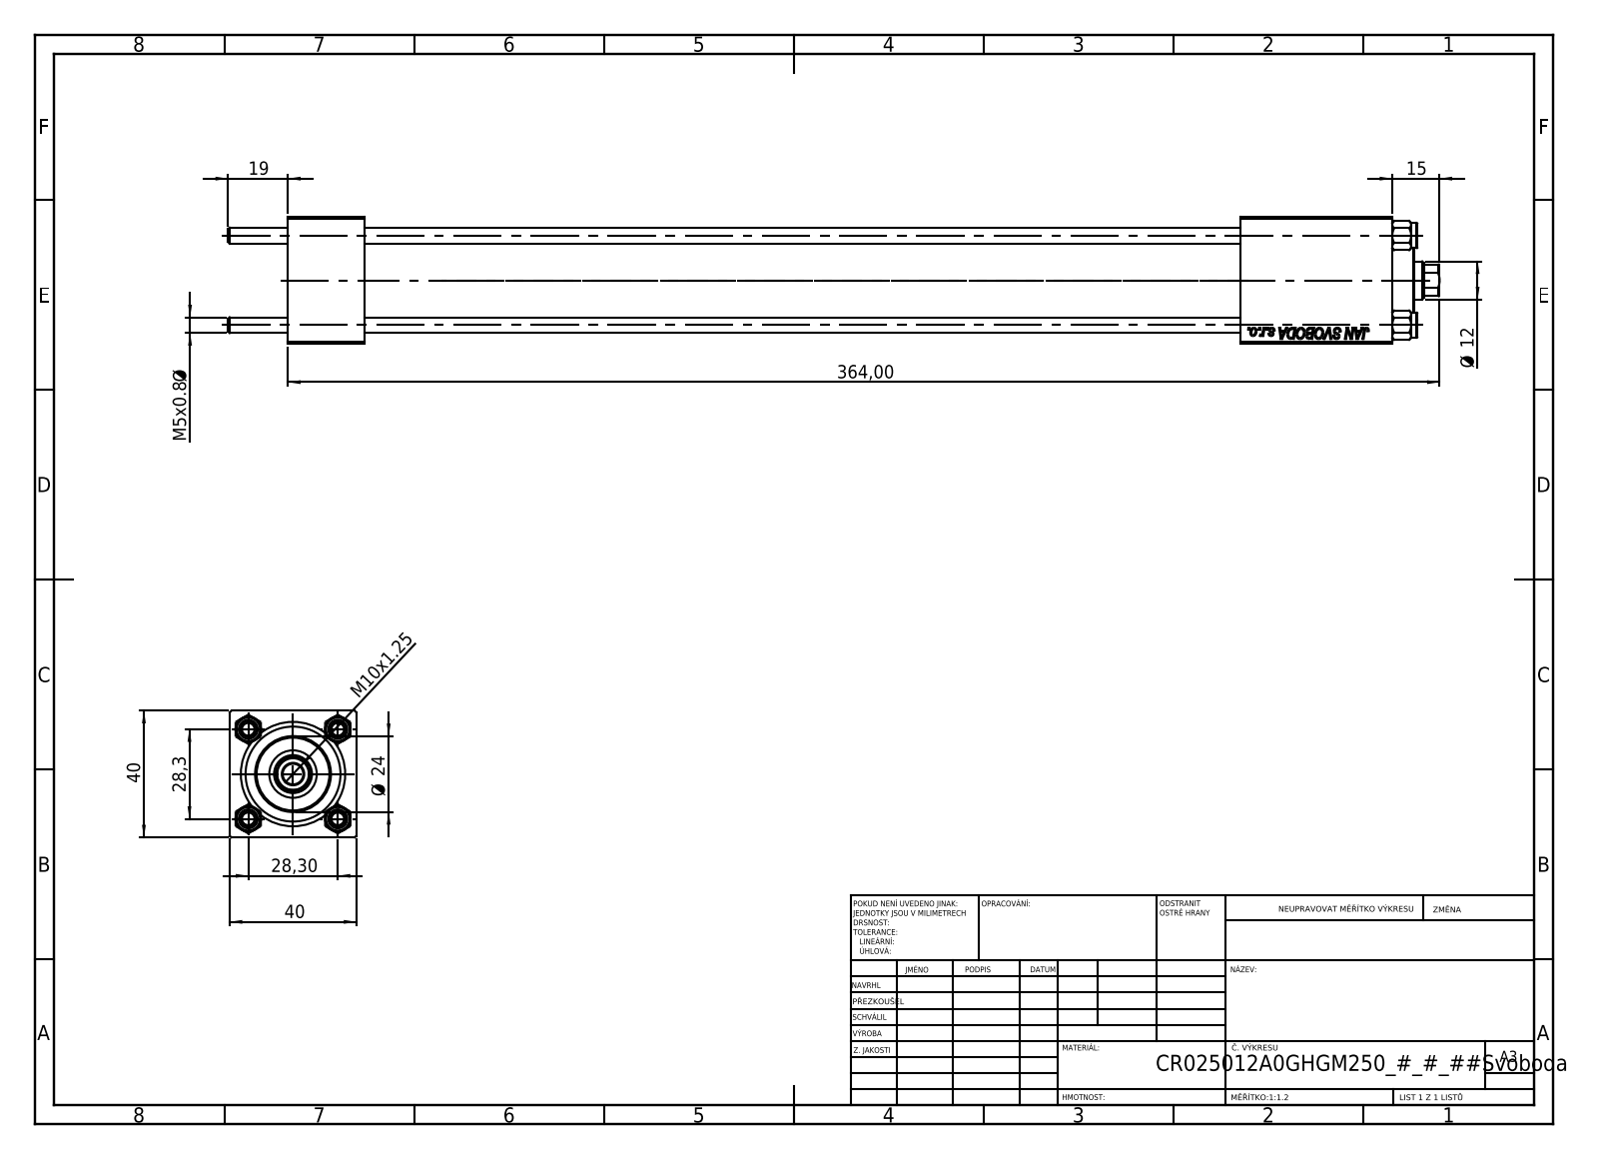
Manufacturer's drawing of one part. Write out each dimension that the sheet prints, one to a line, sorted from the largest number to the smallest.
364,00
40
40
28,3
28,30
Ø 24
19
15
Ø 12
M10x1.25
M5x0.8 Ø
